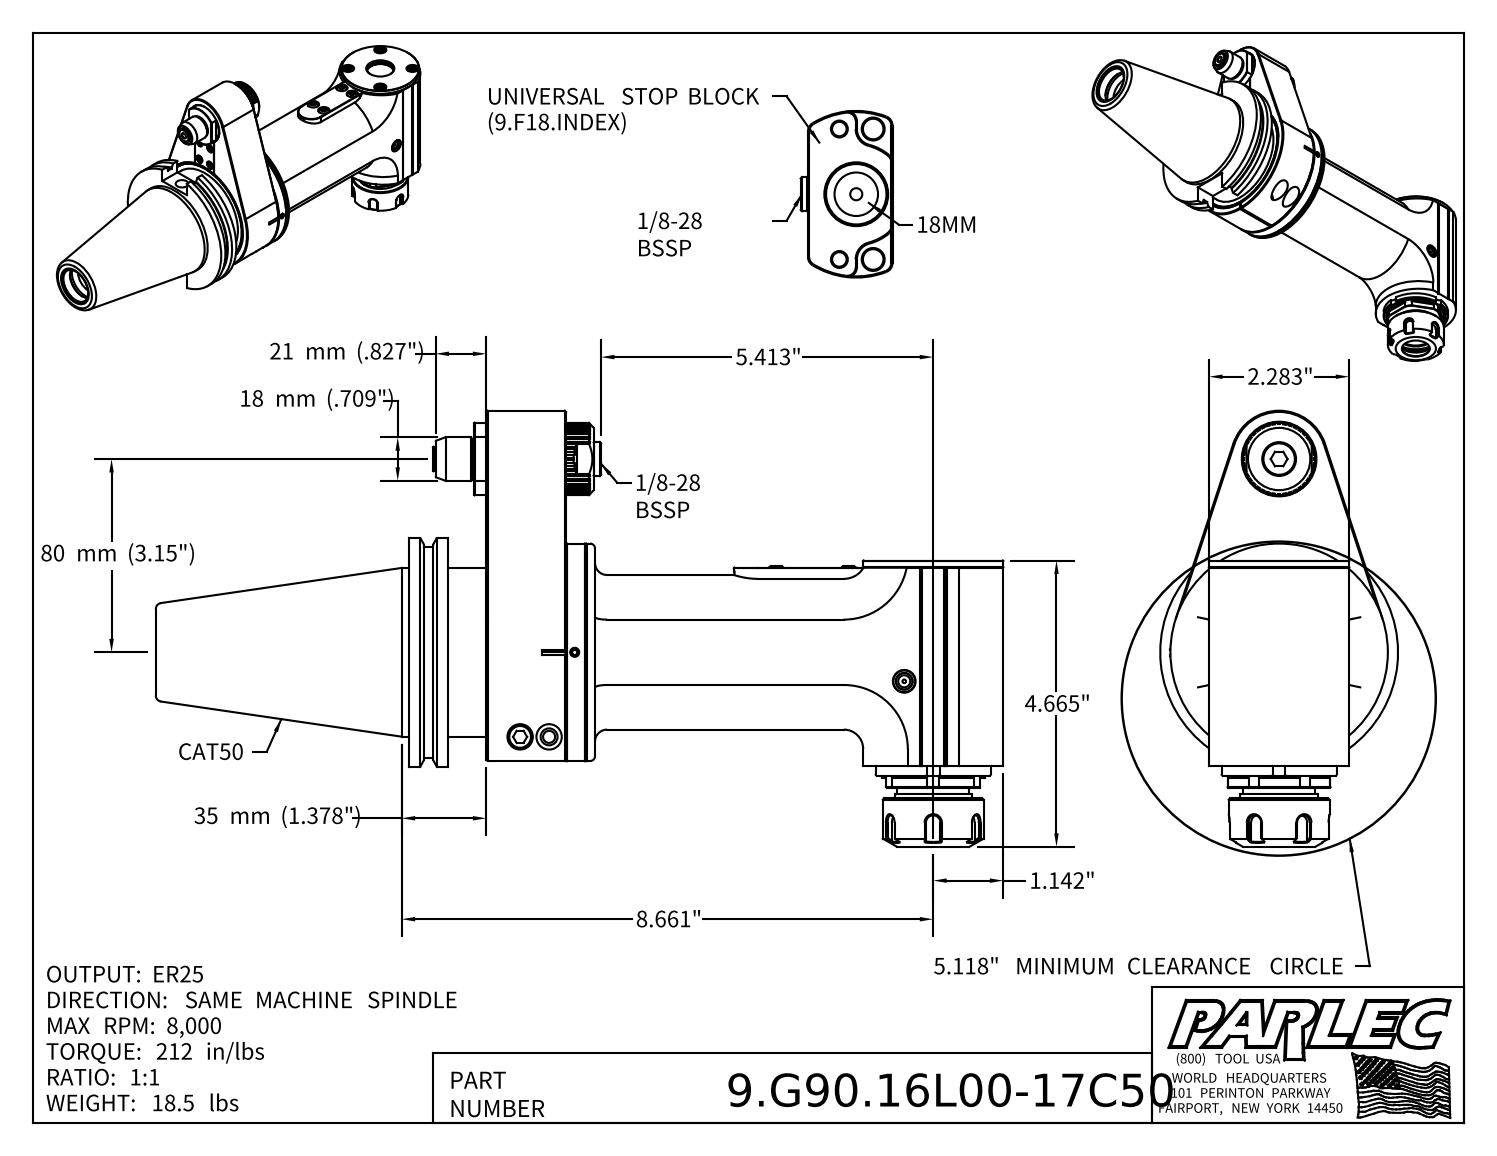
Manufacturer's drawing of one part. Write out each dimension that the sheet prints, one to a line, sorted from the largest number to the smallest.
80 mm (3.15")
35 mm (1.378")
21 mm (.827")
18 mm (.709")
8.661"
5.413"
4.665"
2.283"
1.142"
